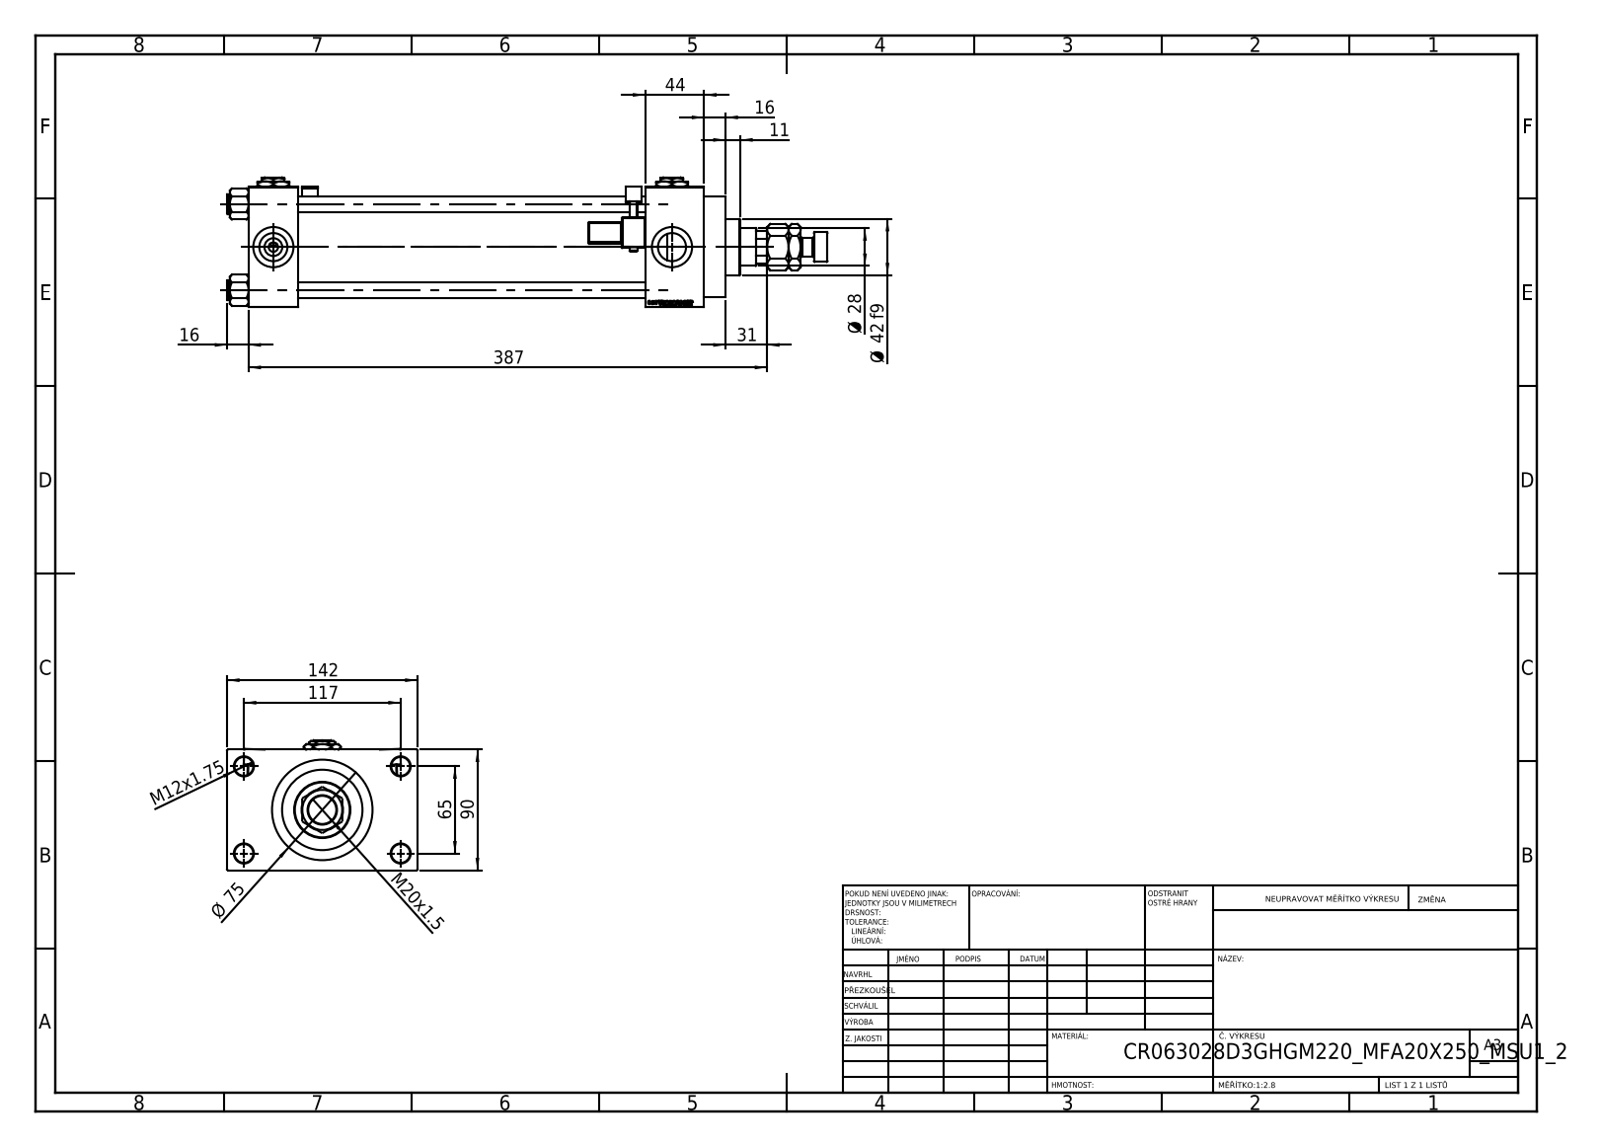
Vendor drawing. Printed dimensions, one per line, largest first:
387
142
117
90
Ø 75
65
44
Ø 42 f9
31
Ø 28
M20x1.5
16
16
M12x1.75
11
